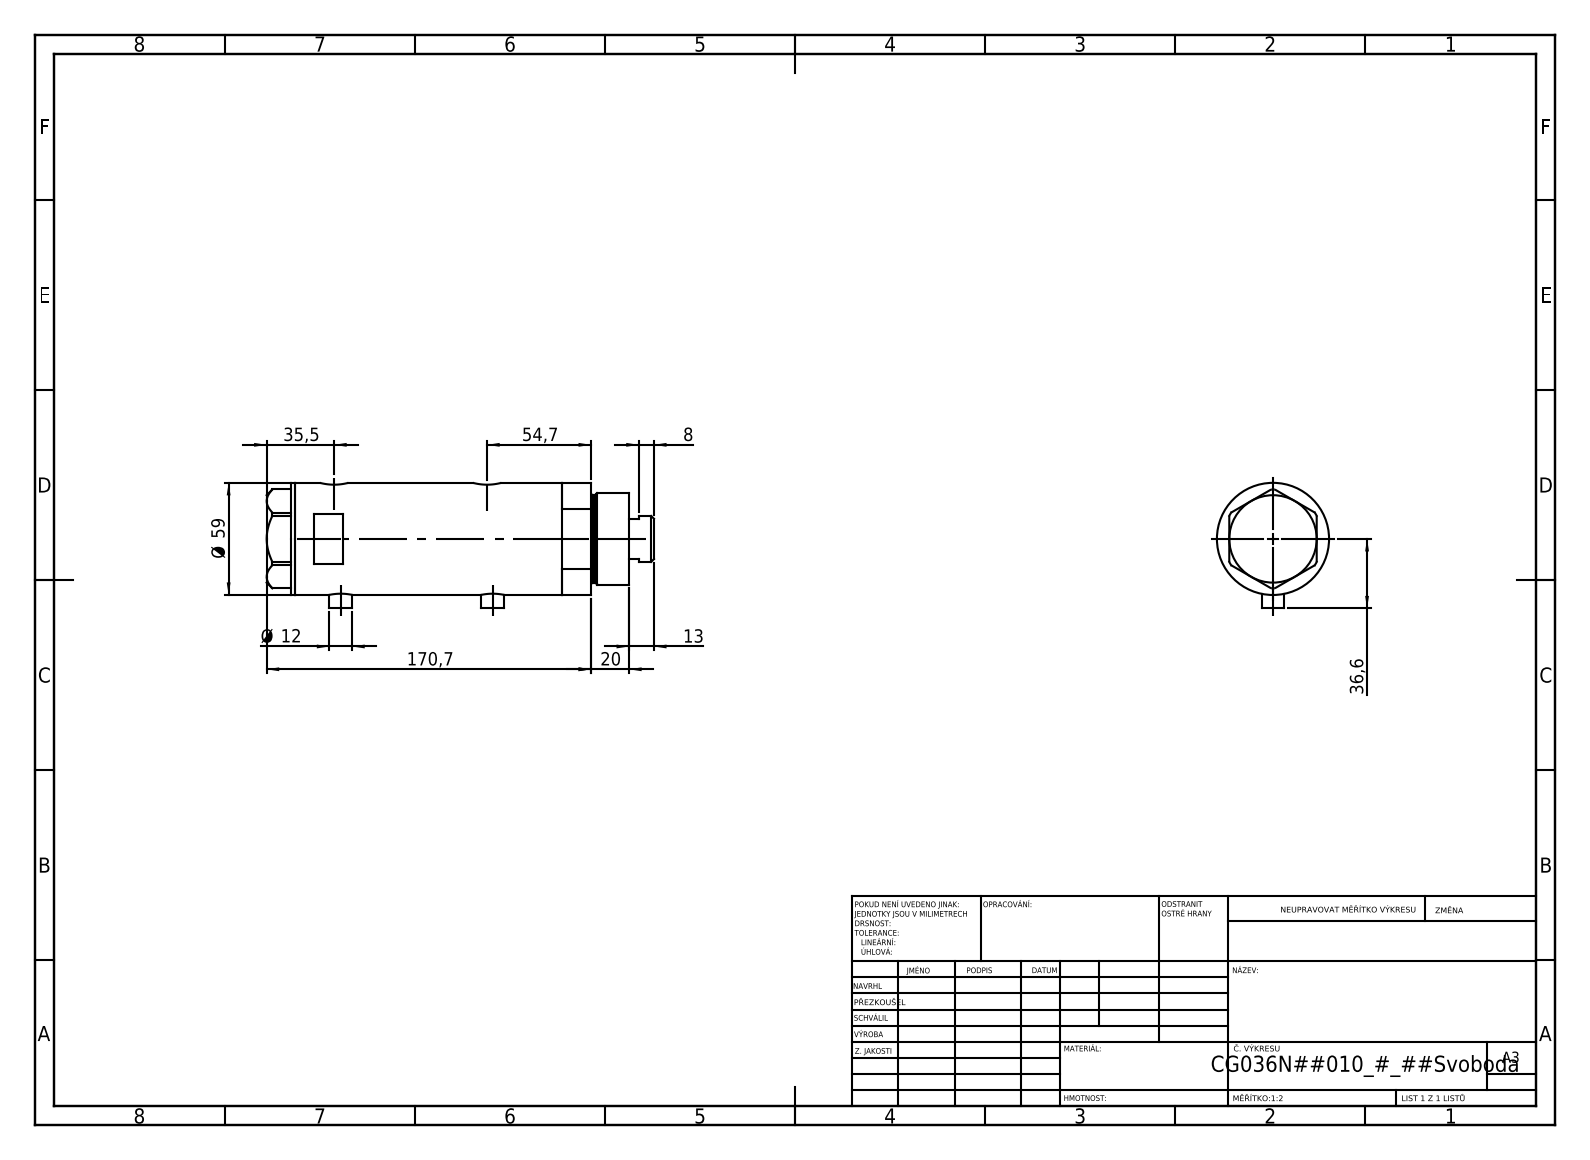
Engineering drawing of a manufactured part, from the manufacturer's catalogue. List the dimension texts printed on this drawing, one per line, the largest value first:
170,7
Ø 59
54,7
36,6
35,5
20
13
Ø 12
8
